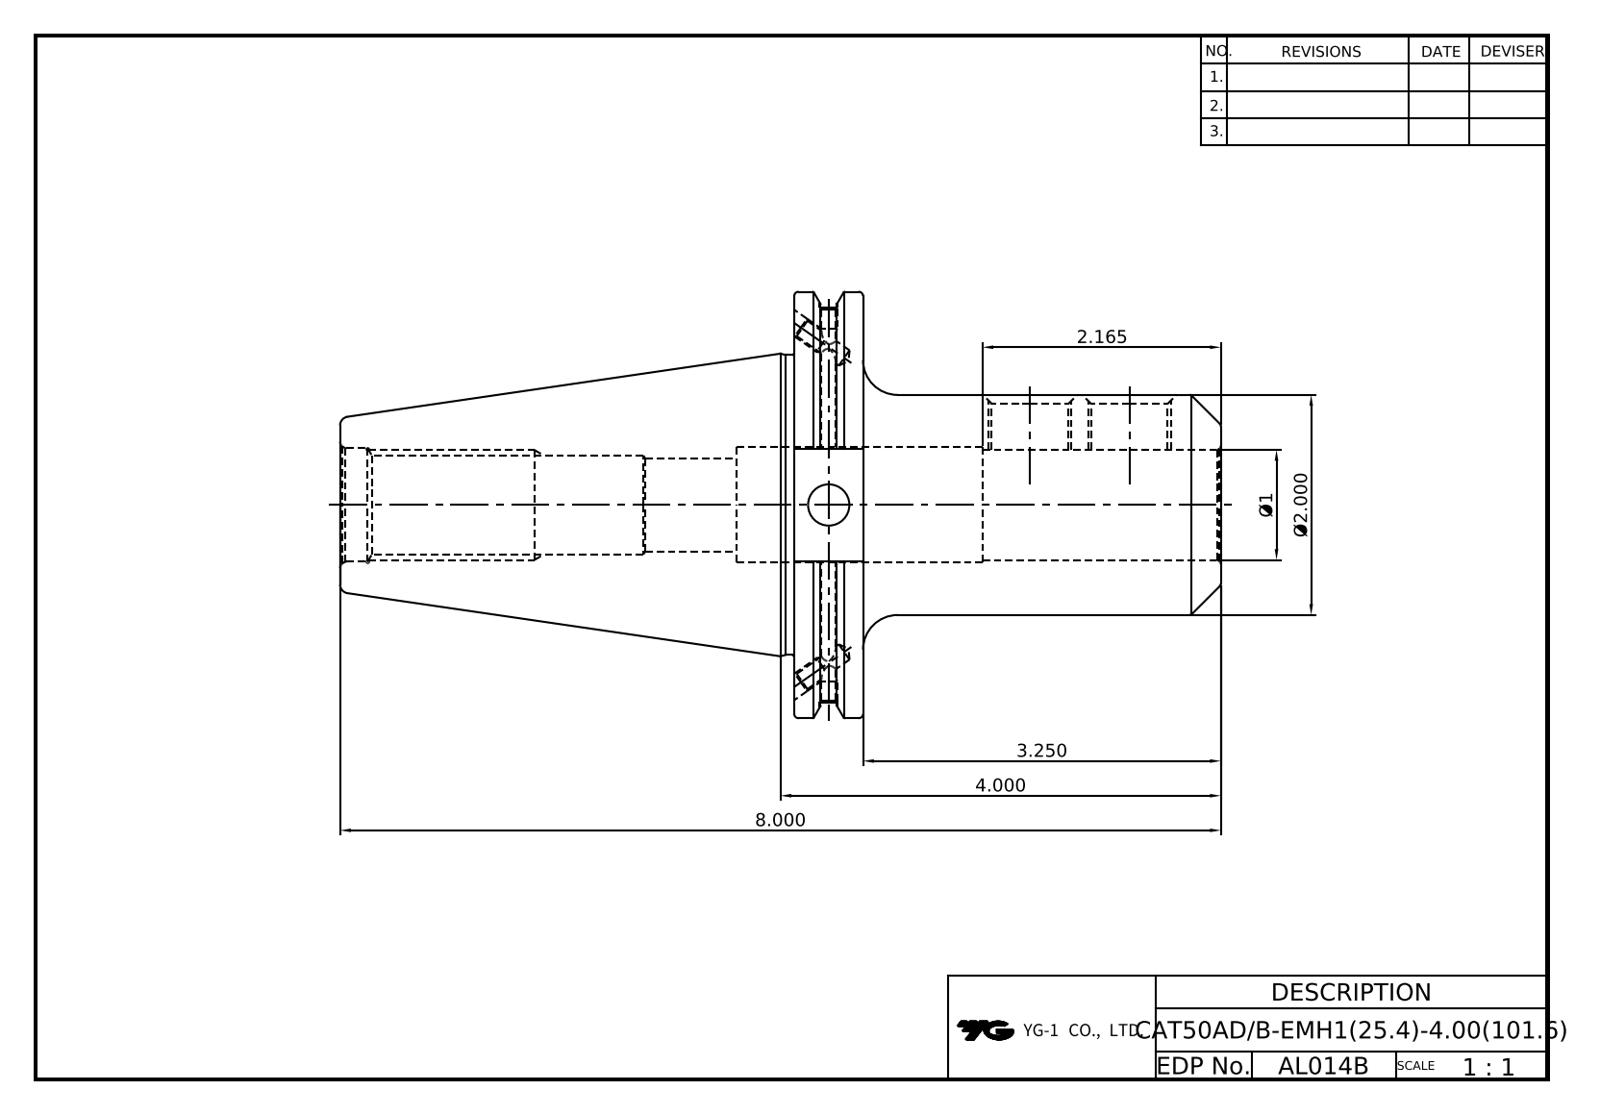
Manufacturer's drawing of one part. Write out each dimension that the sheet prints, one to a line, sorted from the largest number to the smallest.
8.000
4.000
3.250
2.165
Ø2.000
Ø1
